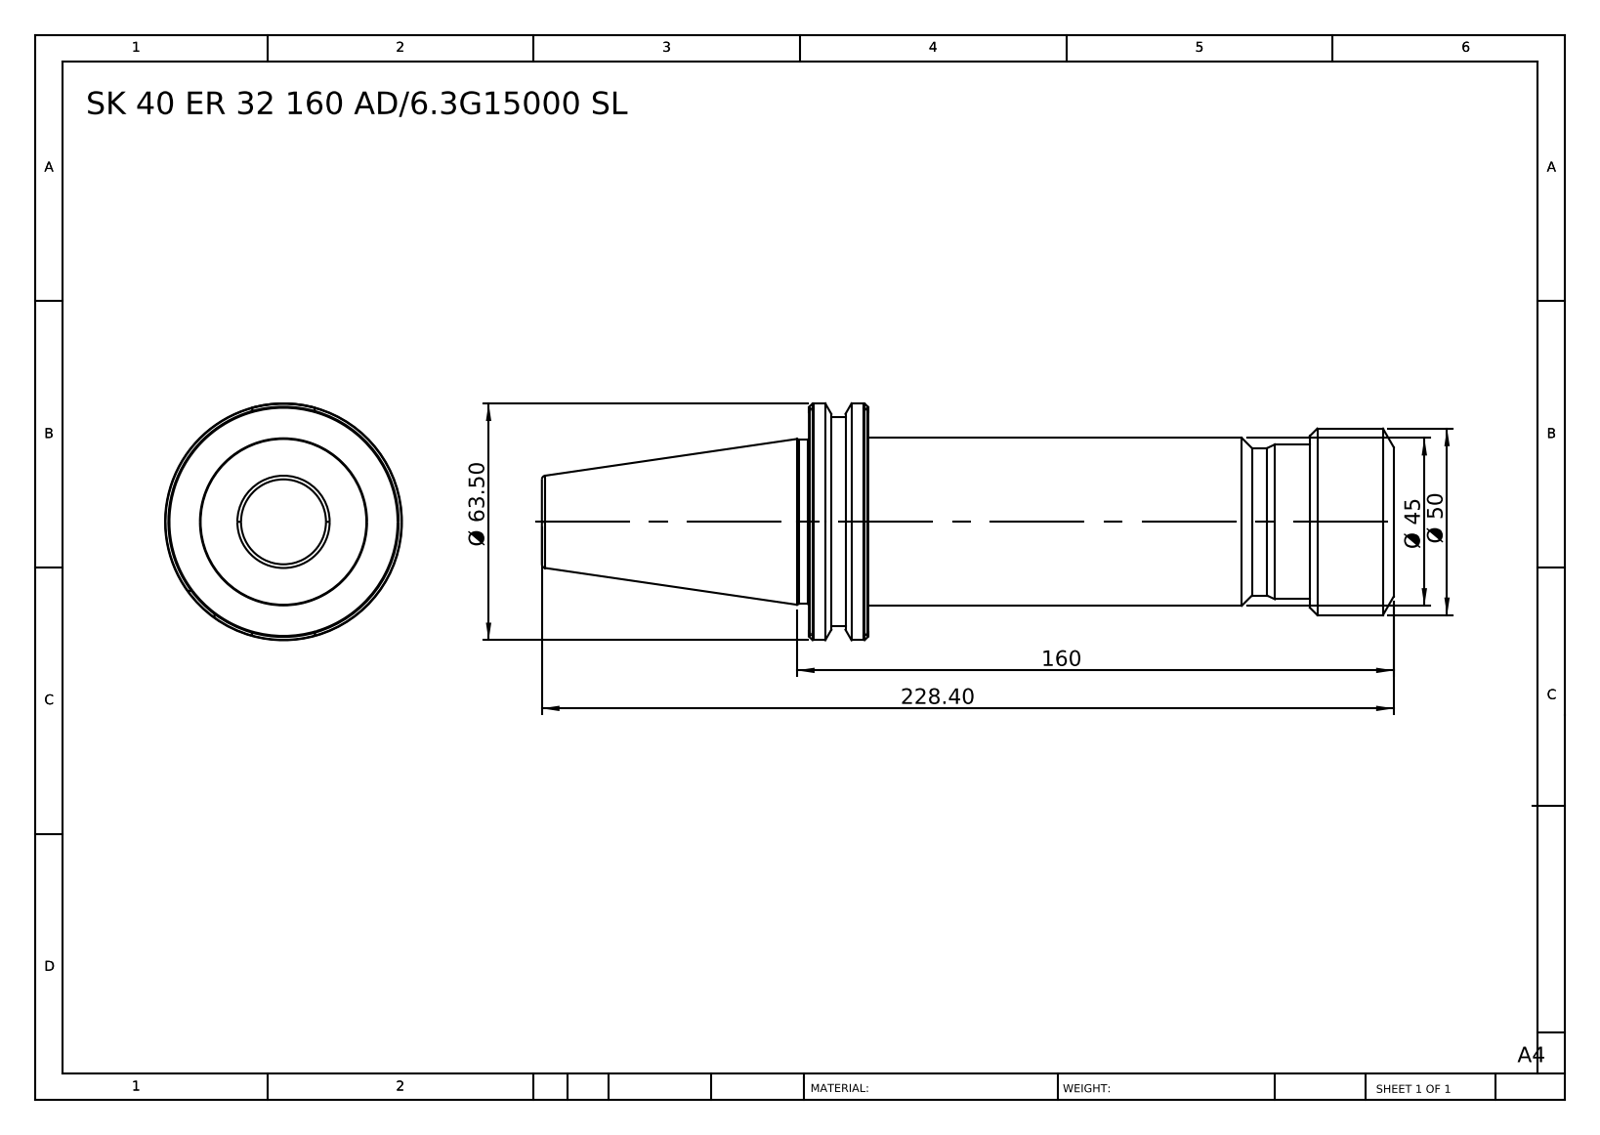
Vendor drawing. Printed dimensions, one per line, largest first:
228.40
160
Ø 63.50
Ø 50
Ø 45
